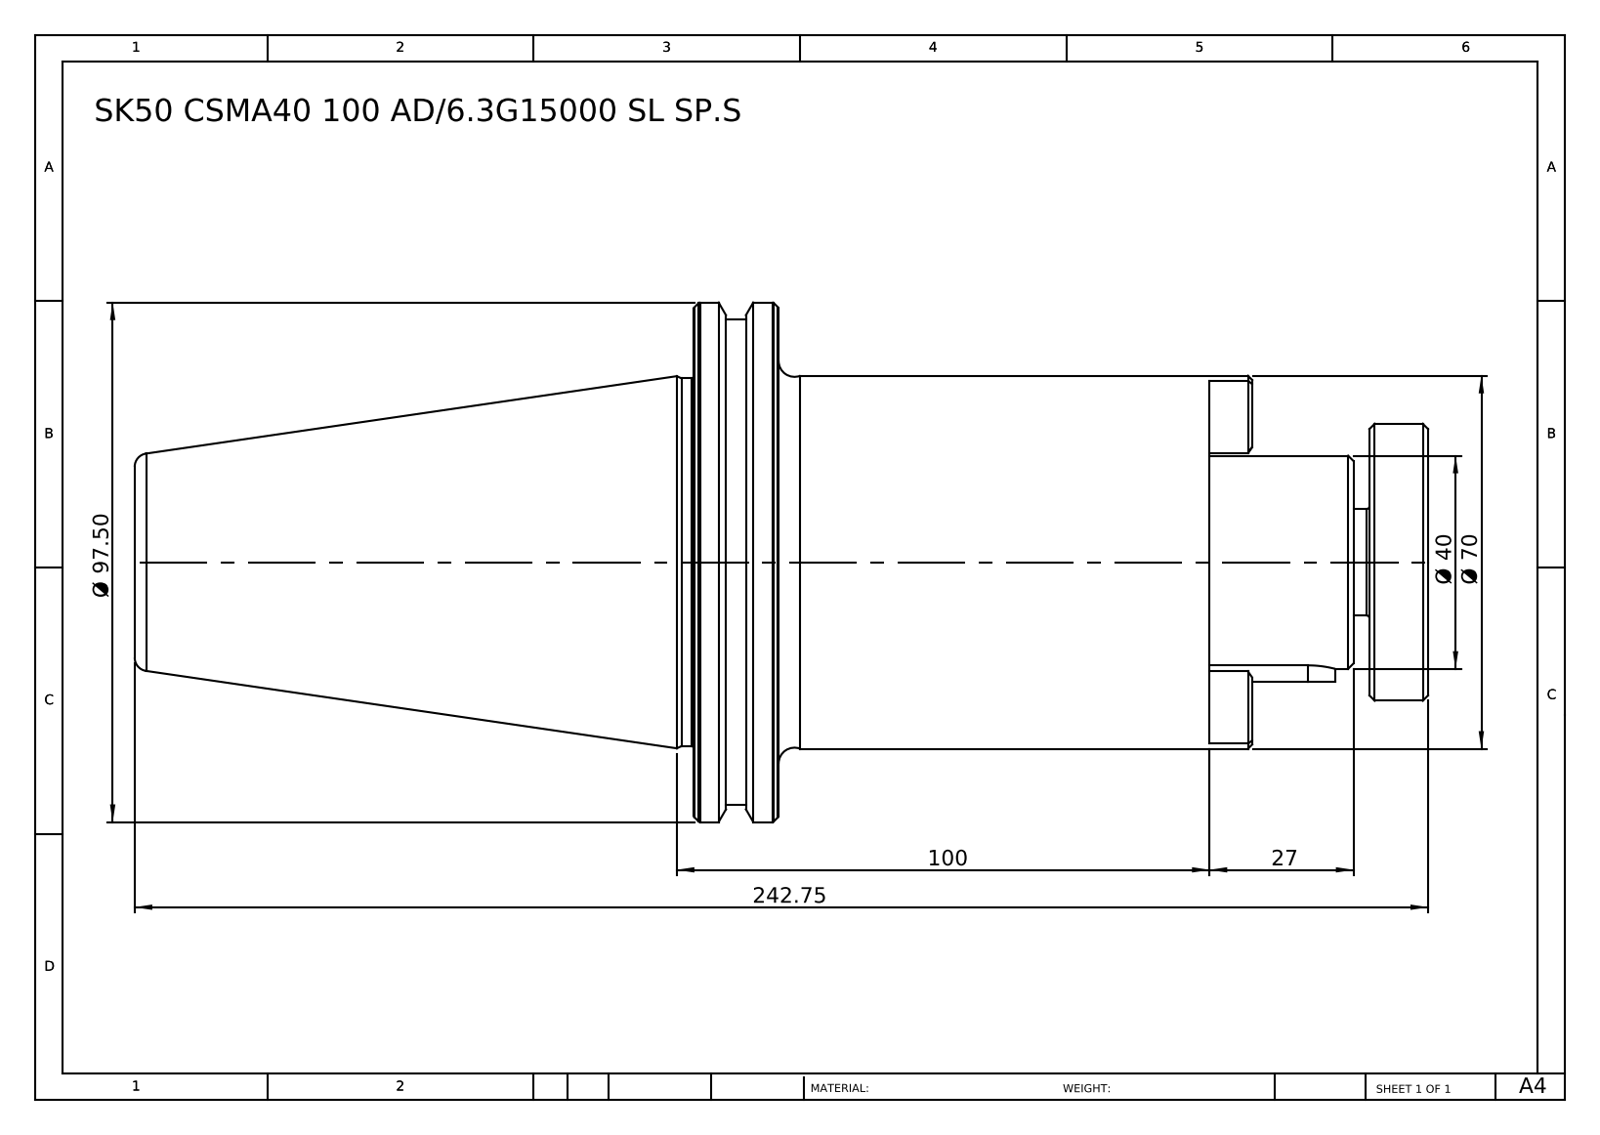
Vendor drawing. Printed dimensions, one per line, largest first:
242.75
100
Ø 97.50
Ø 70
Ø 40
27
